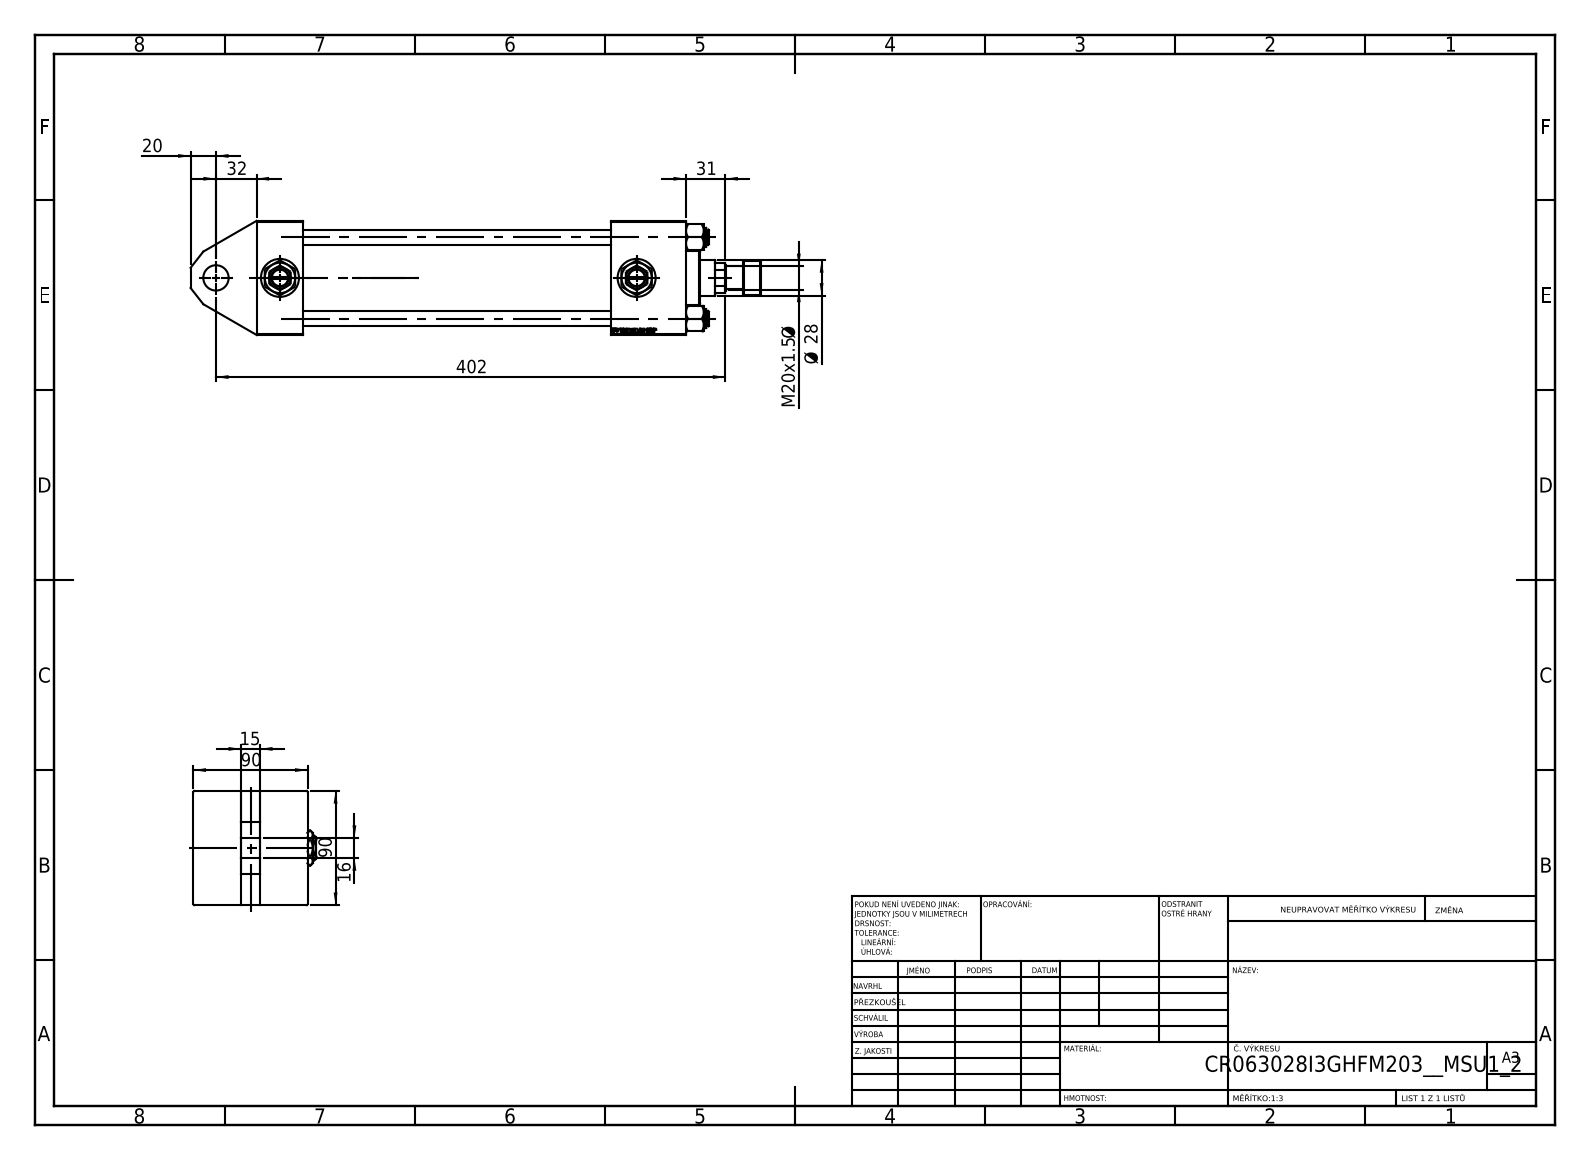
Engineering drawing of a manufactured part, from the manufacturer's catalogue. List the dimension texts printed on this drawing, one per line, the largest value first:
402
90
90
32
31
Ø 28
M20x1.5 Ø
20
16
15
